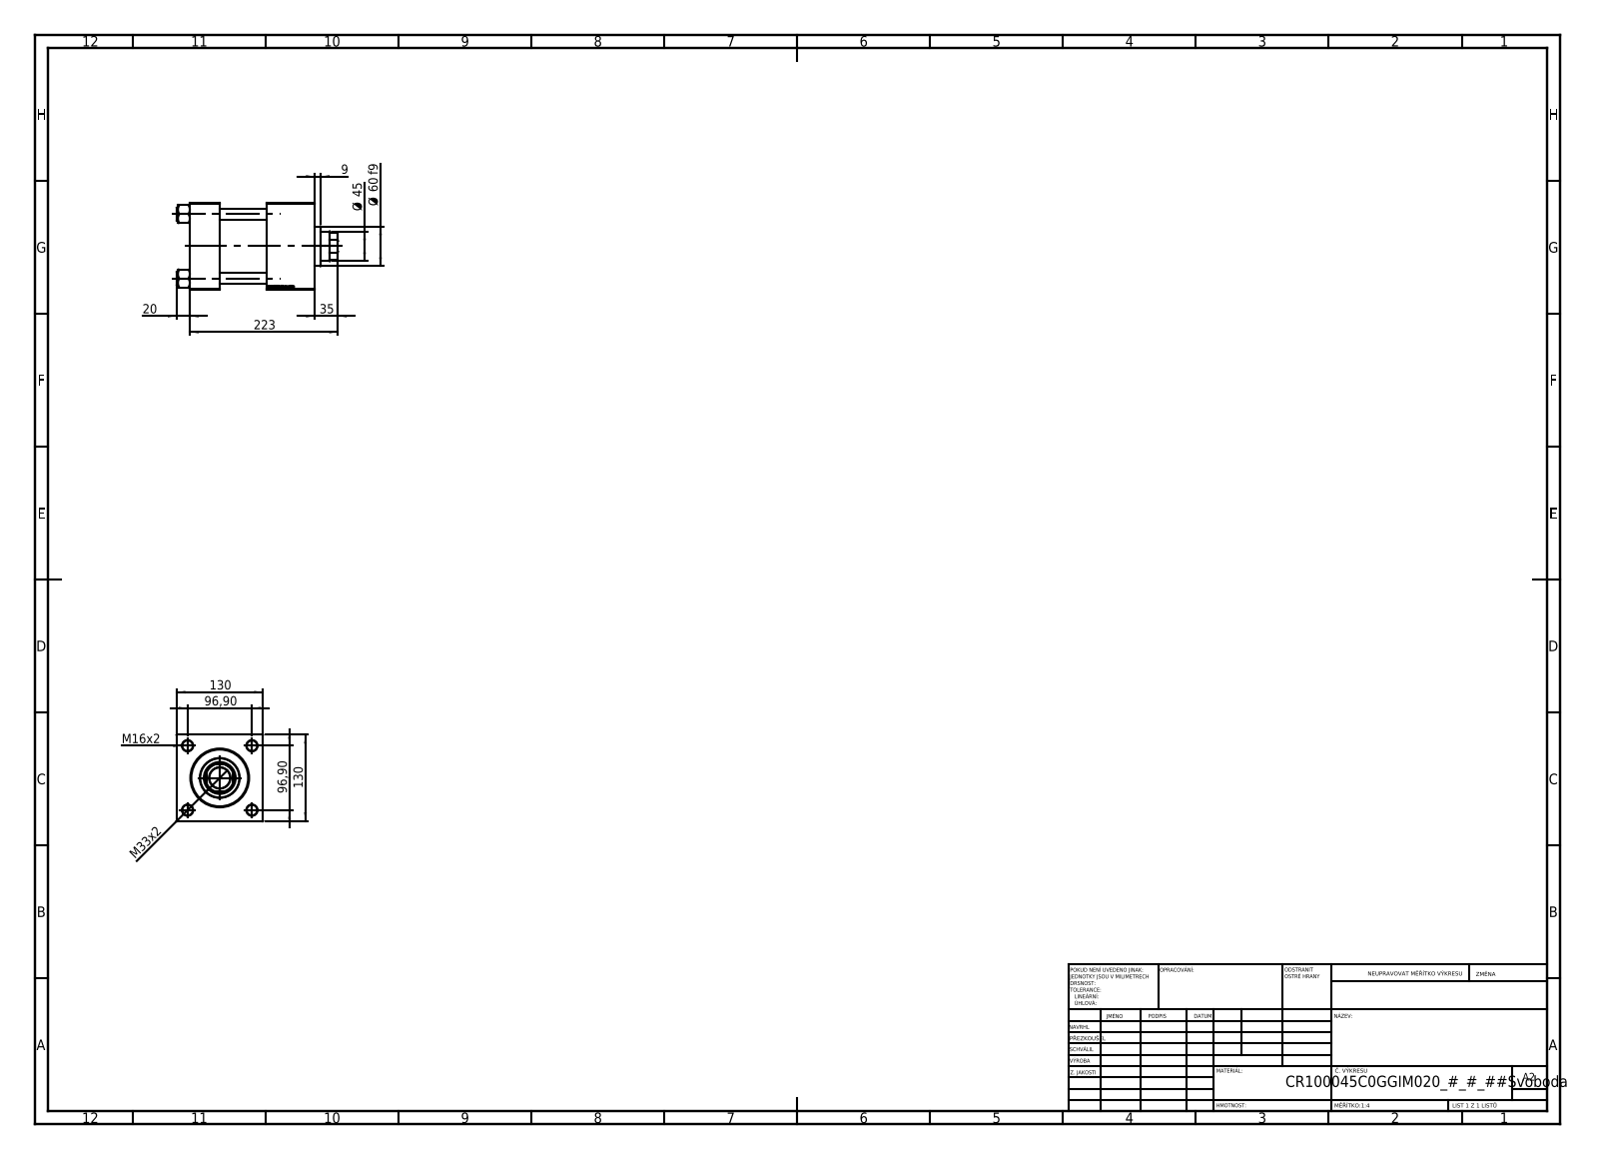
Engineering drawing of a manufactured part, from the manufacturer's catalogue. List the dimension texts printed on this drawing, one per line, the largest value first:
223
130
130
96,90
96,90
Ø 60 f9
Ø 45
35
M33x2
20
M16x2
9
